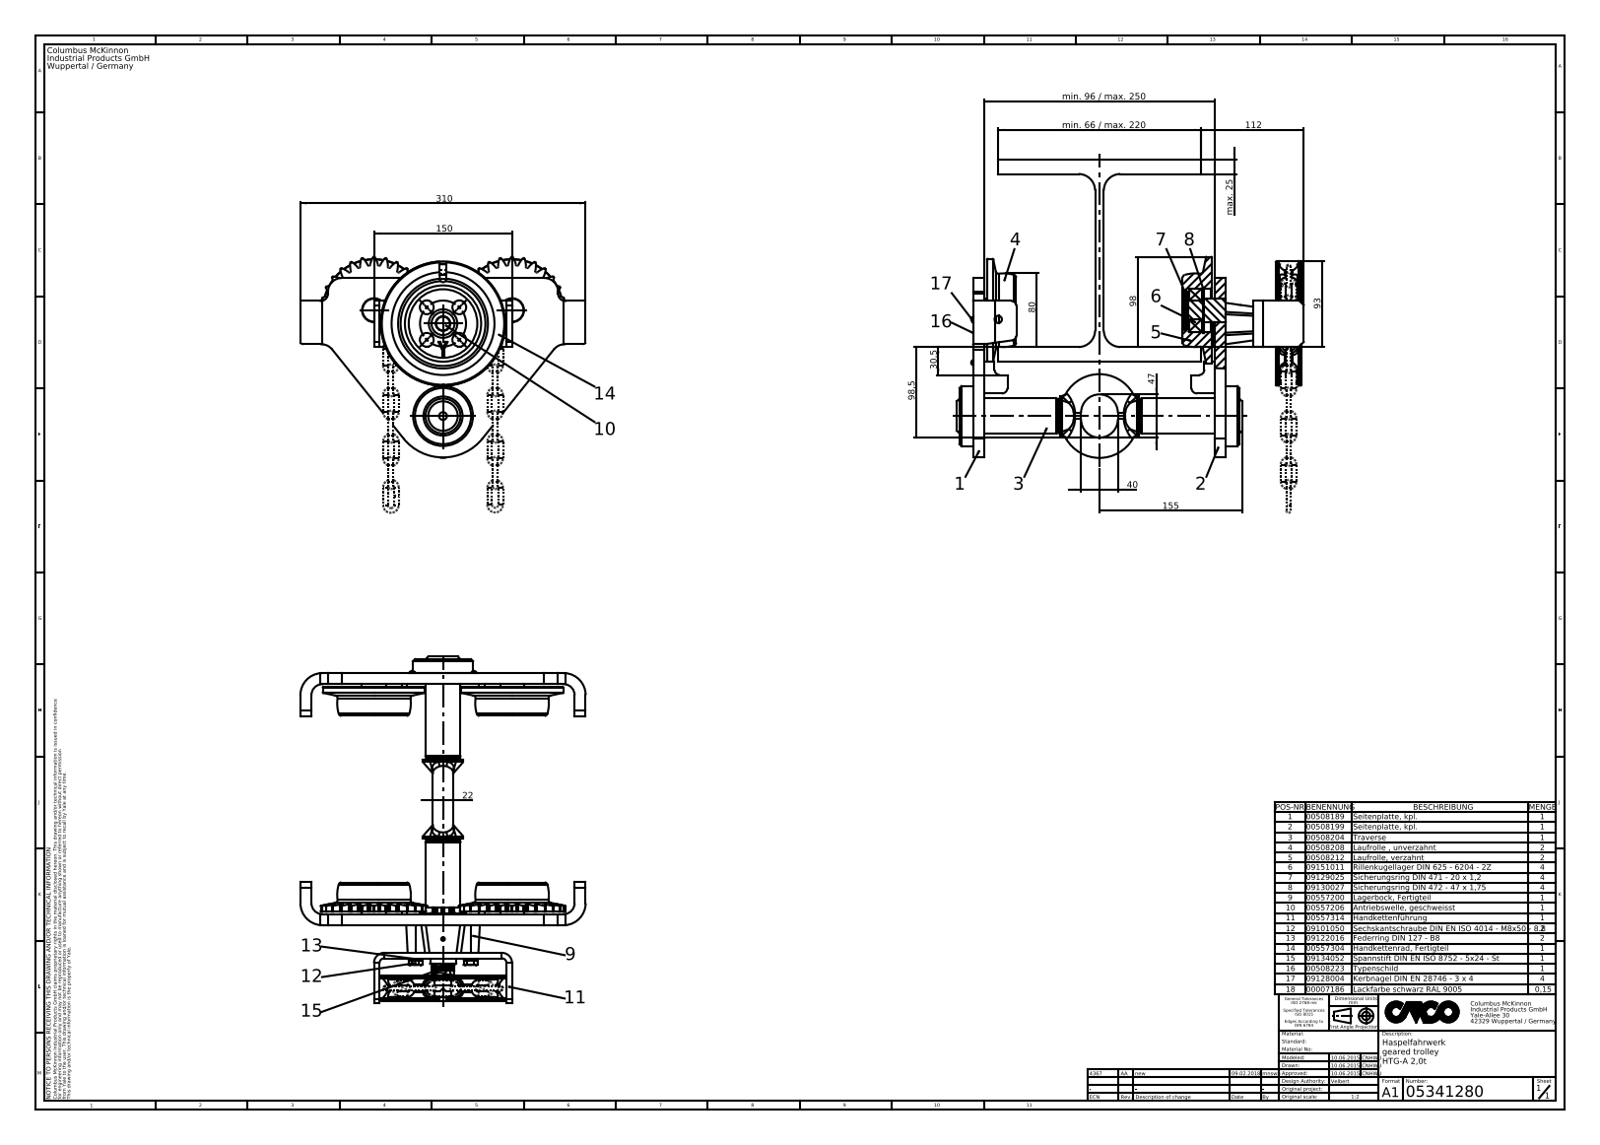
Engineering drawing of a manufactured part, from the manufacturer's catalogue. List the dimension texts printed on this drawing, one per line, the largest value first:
310
155
150
112
98,5
98
min. 96 / max. 250
93
80
min. 66 / max. 220
47
40
30,5
max. 25
22
